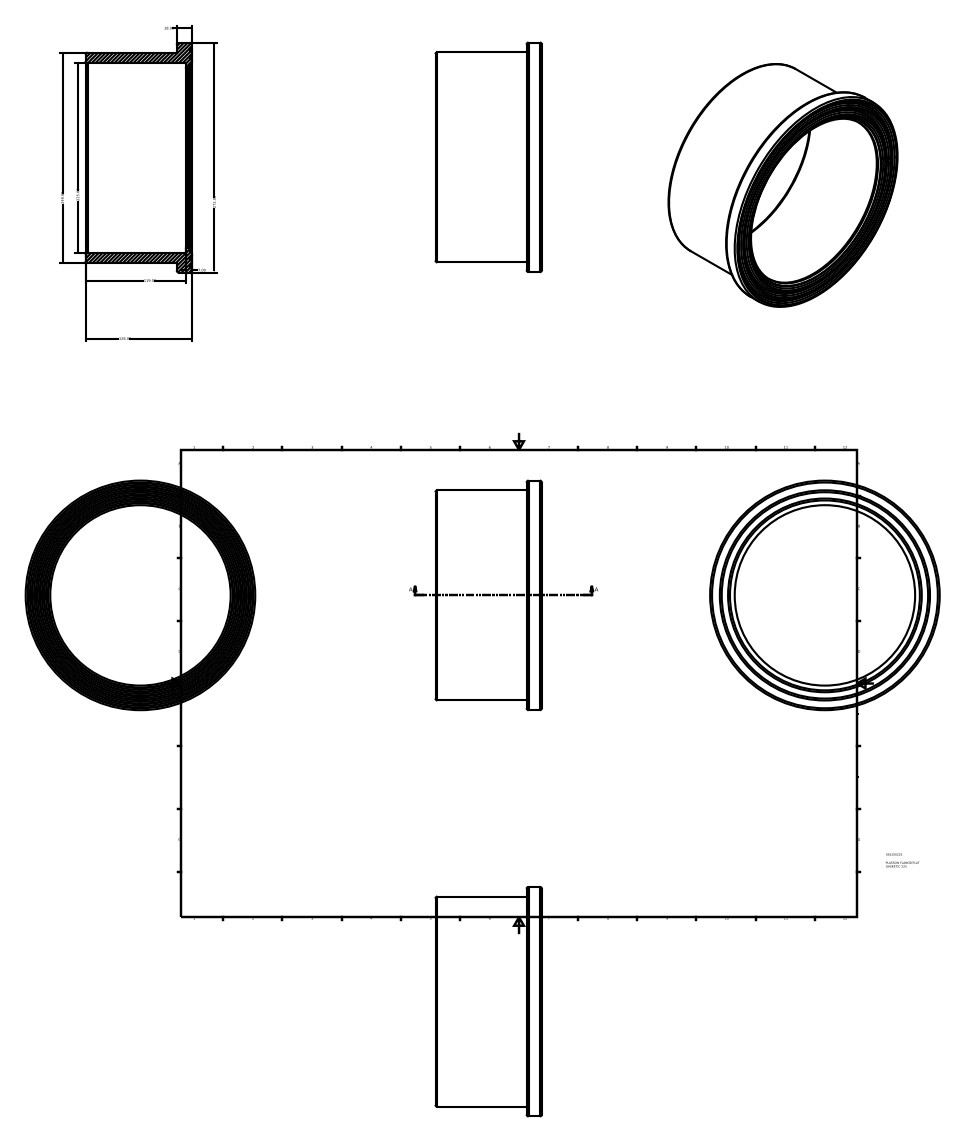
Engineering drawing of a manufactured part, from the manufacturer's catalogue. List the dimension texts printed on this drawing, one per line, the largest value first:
272.00
249.00
225.00
126.00
119.00
18.00
7.00
